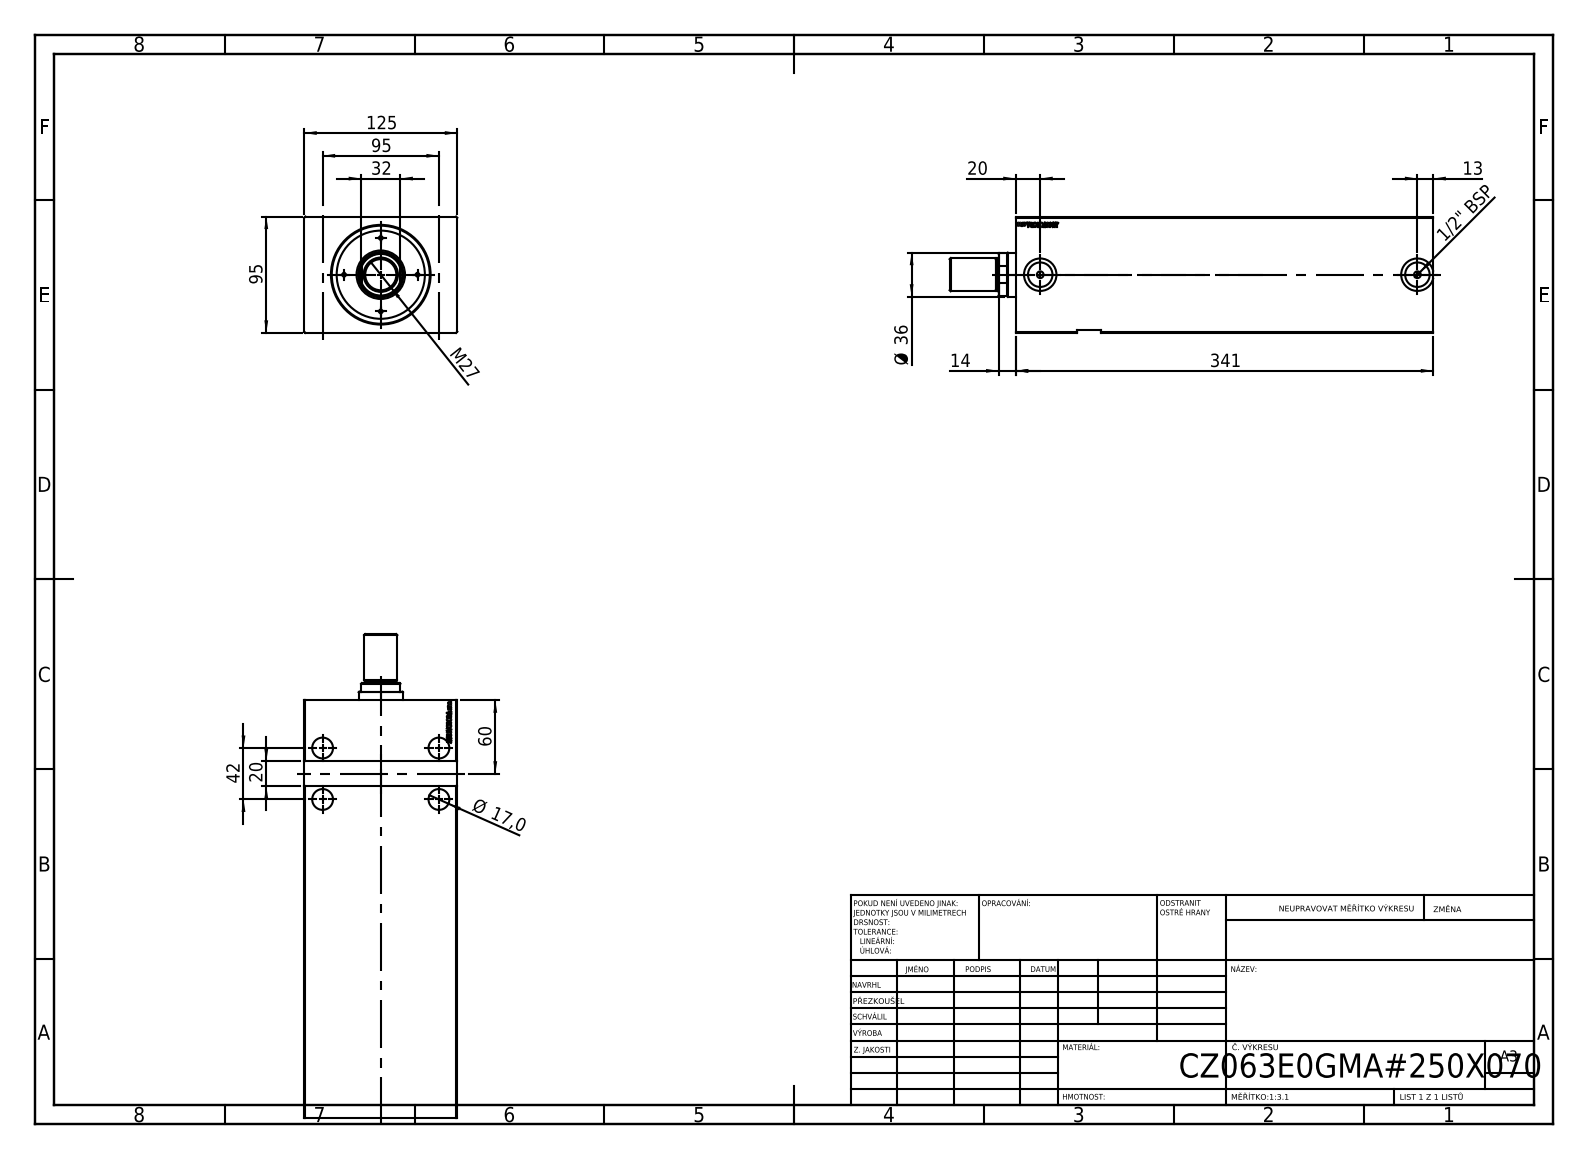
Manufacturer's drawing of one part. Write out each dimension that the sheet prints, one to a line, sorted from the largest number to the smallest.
341
125
95
95
60
42
Ø 36
32
M27
20
20
Ø 17,0
14
13
1/2" BSP
